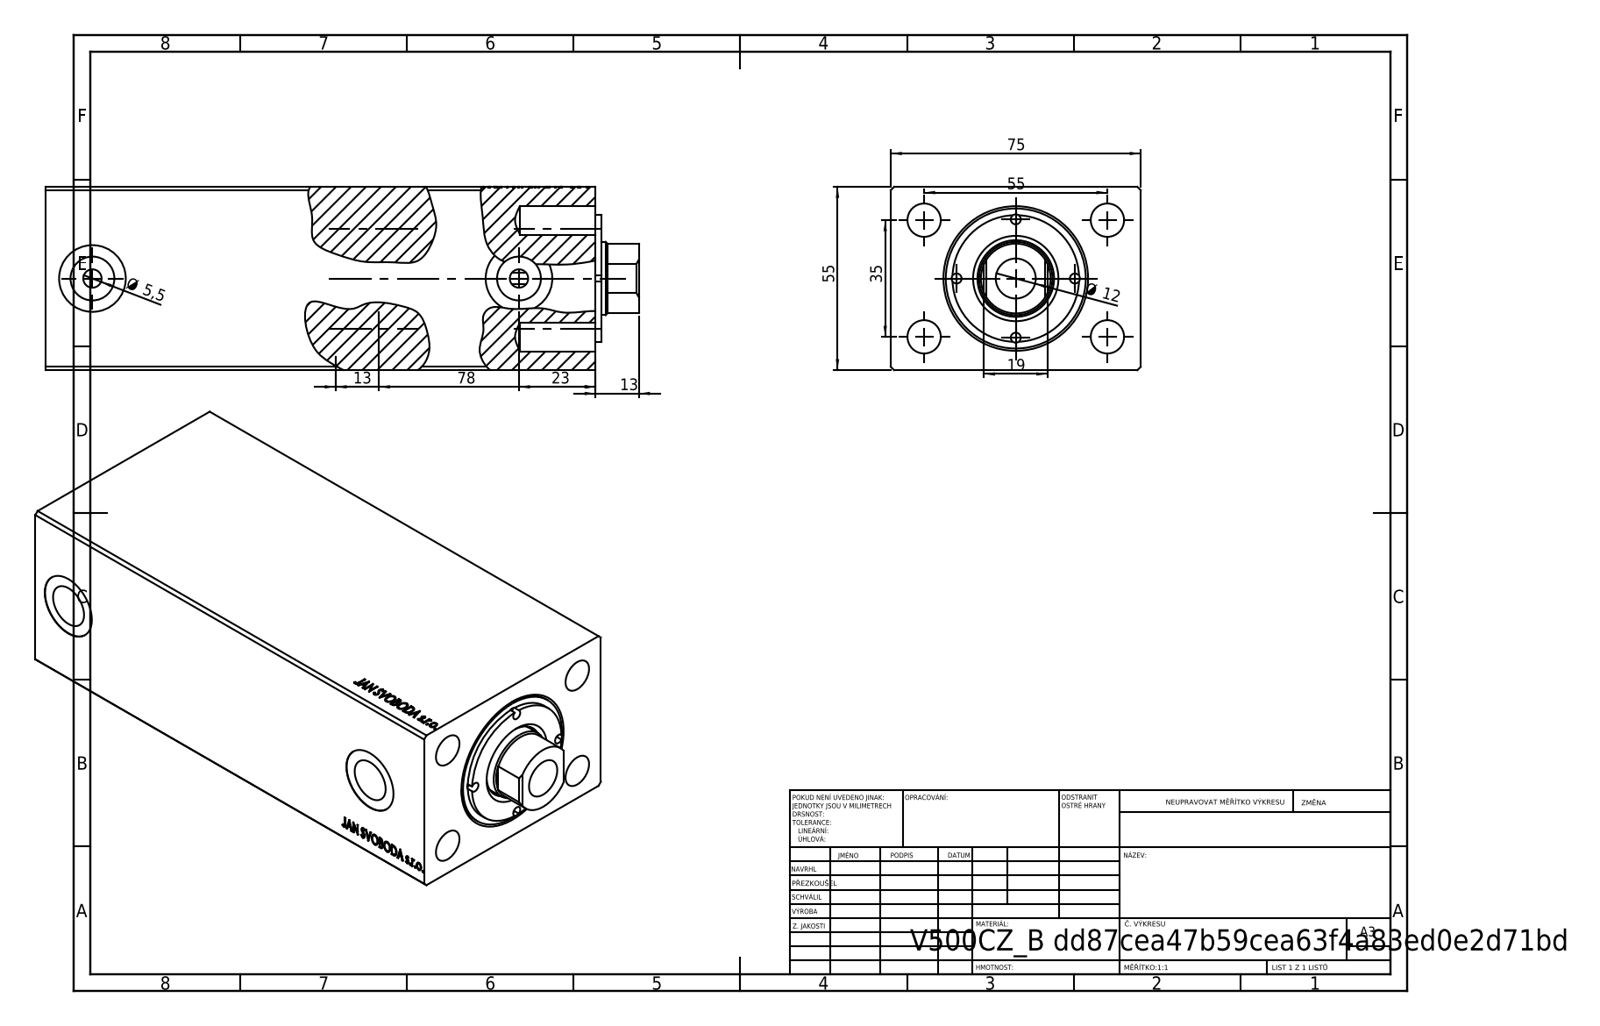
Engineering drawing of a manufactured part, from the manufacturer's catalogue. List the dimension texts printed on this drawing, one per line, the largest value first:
78
75
55
55
35
23
19
13
13
Ø 12
Ø 5,5
